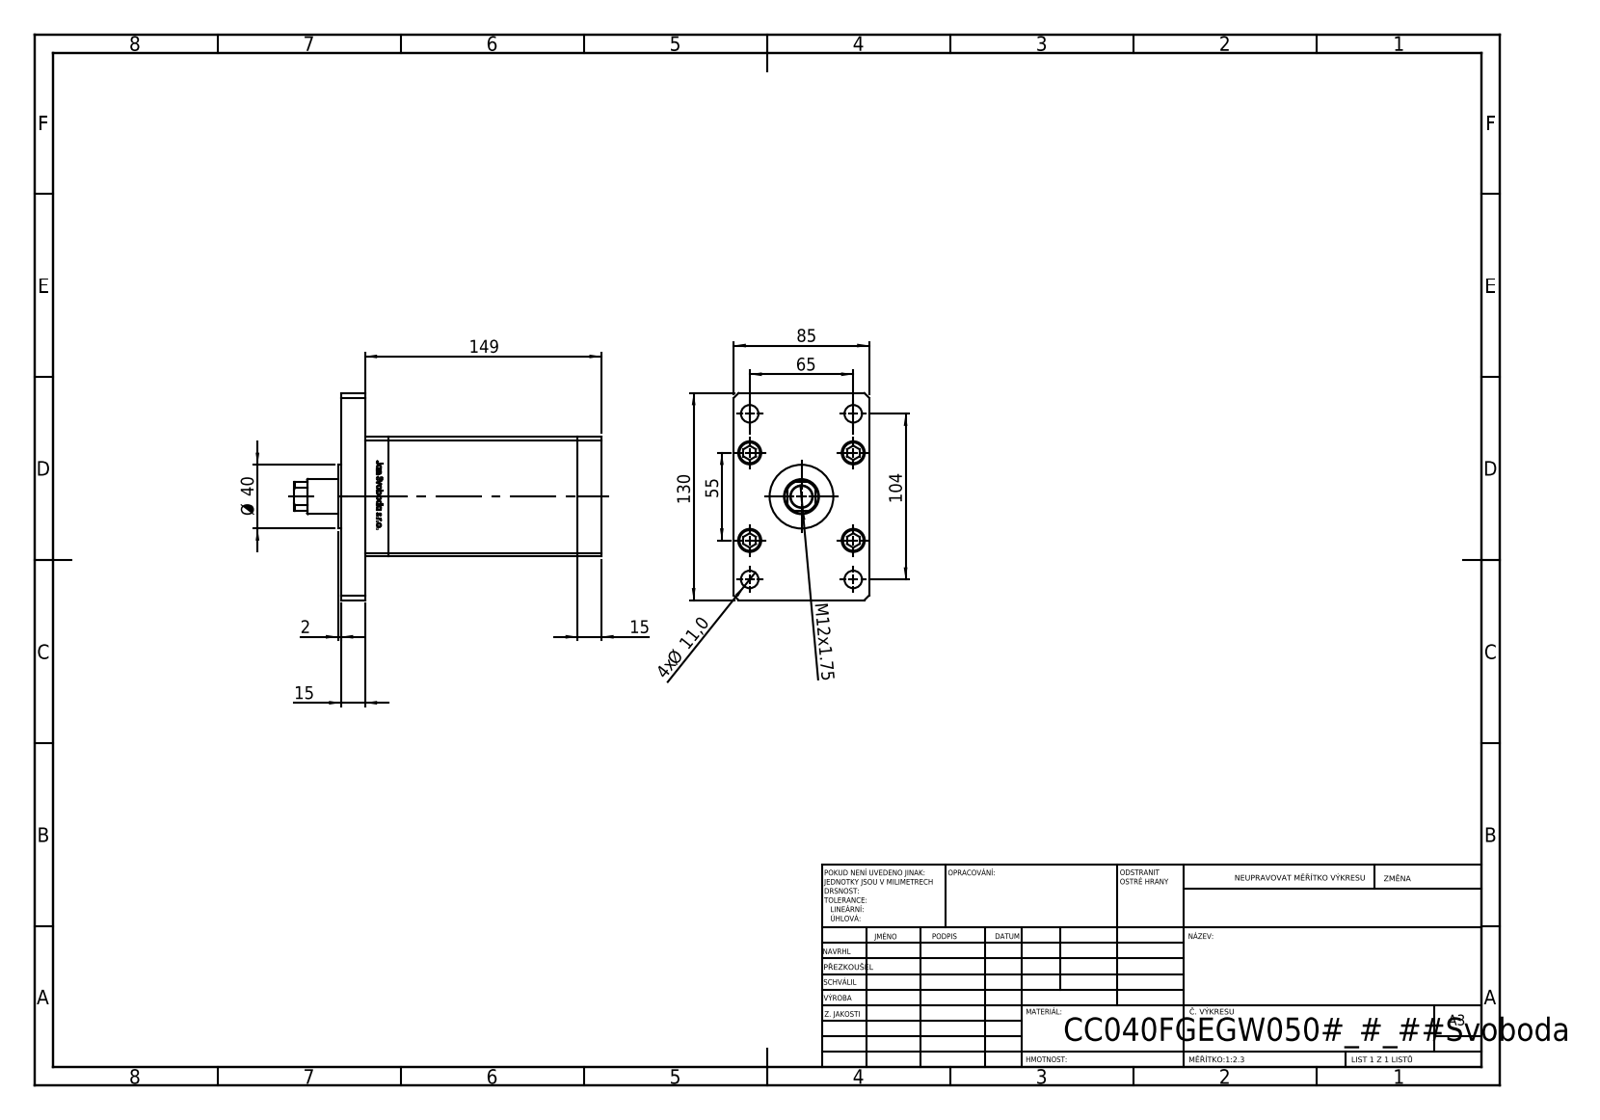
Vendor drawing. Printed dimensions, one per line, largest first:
149
130
104
85
65
55
Ø 40
15
15
M12x1.75
4x Ø 11,0
2
